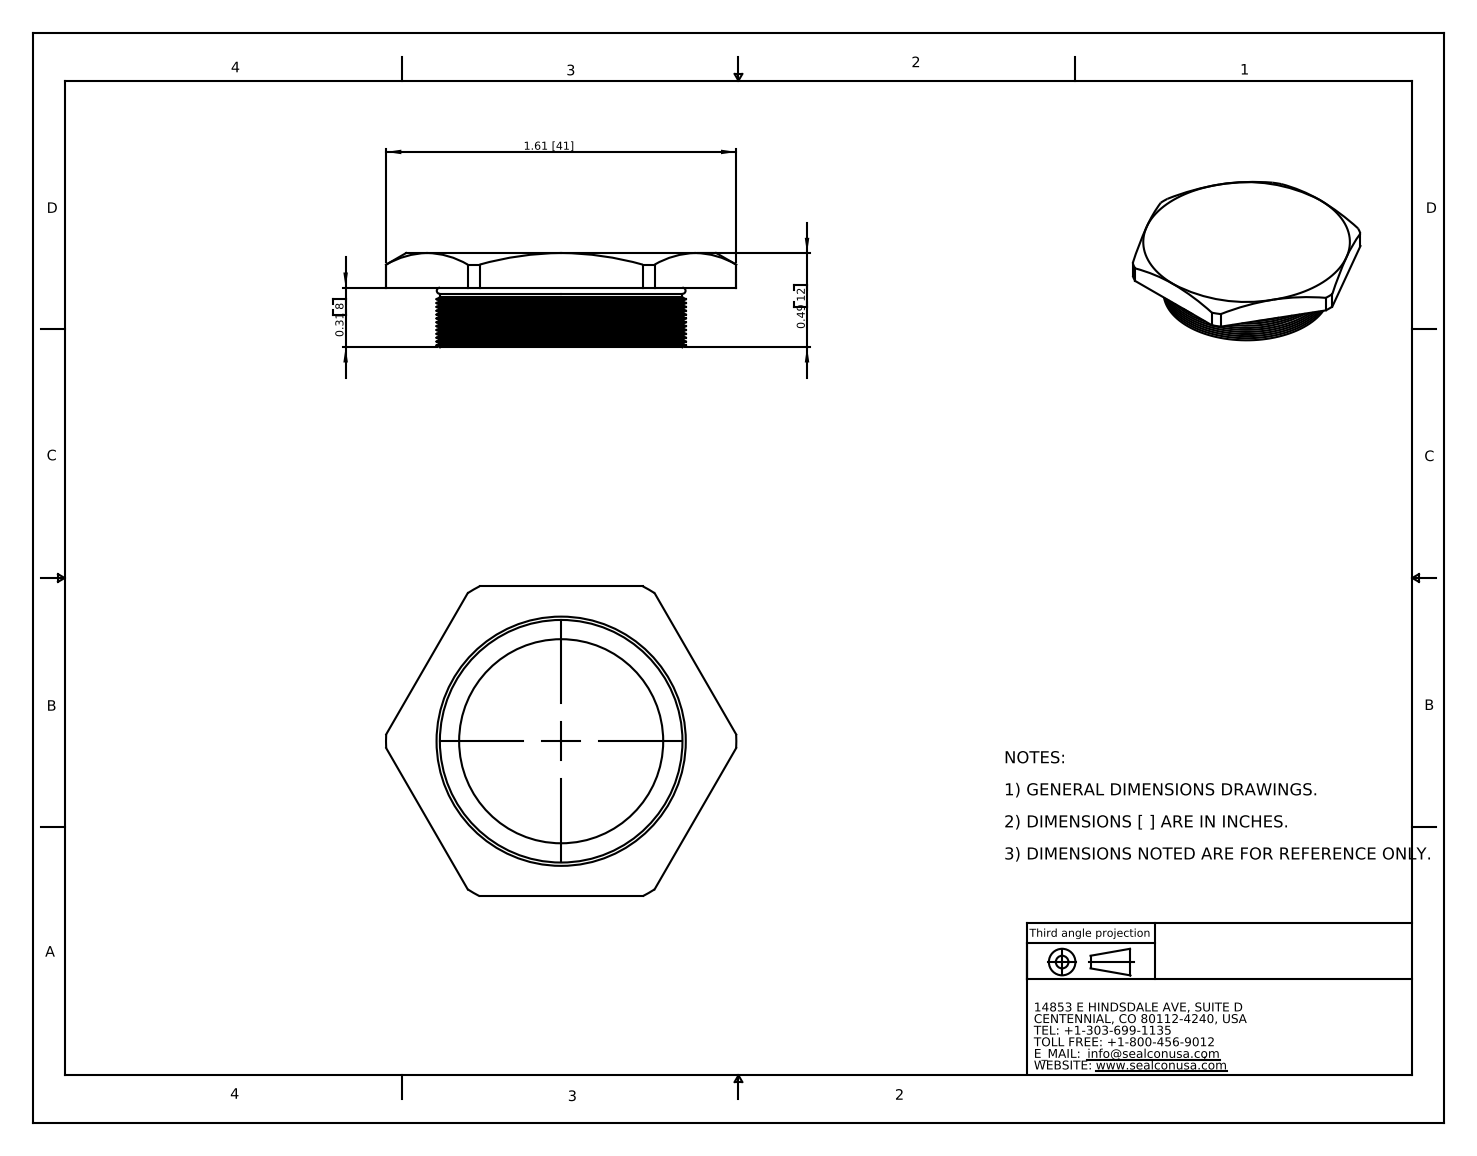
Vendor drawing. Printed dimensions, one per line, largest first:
1.61 [41]
0.49 12
0.31 8
